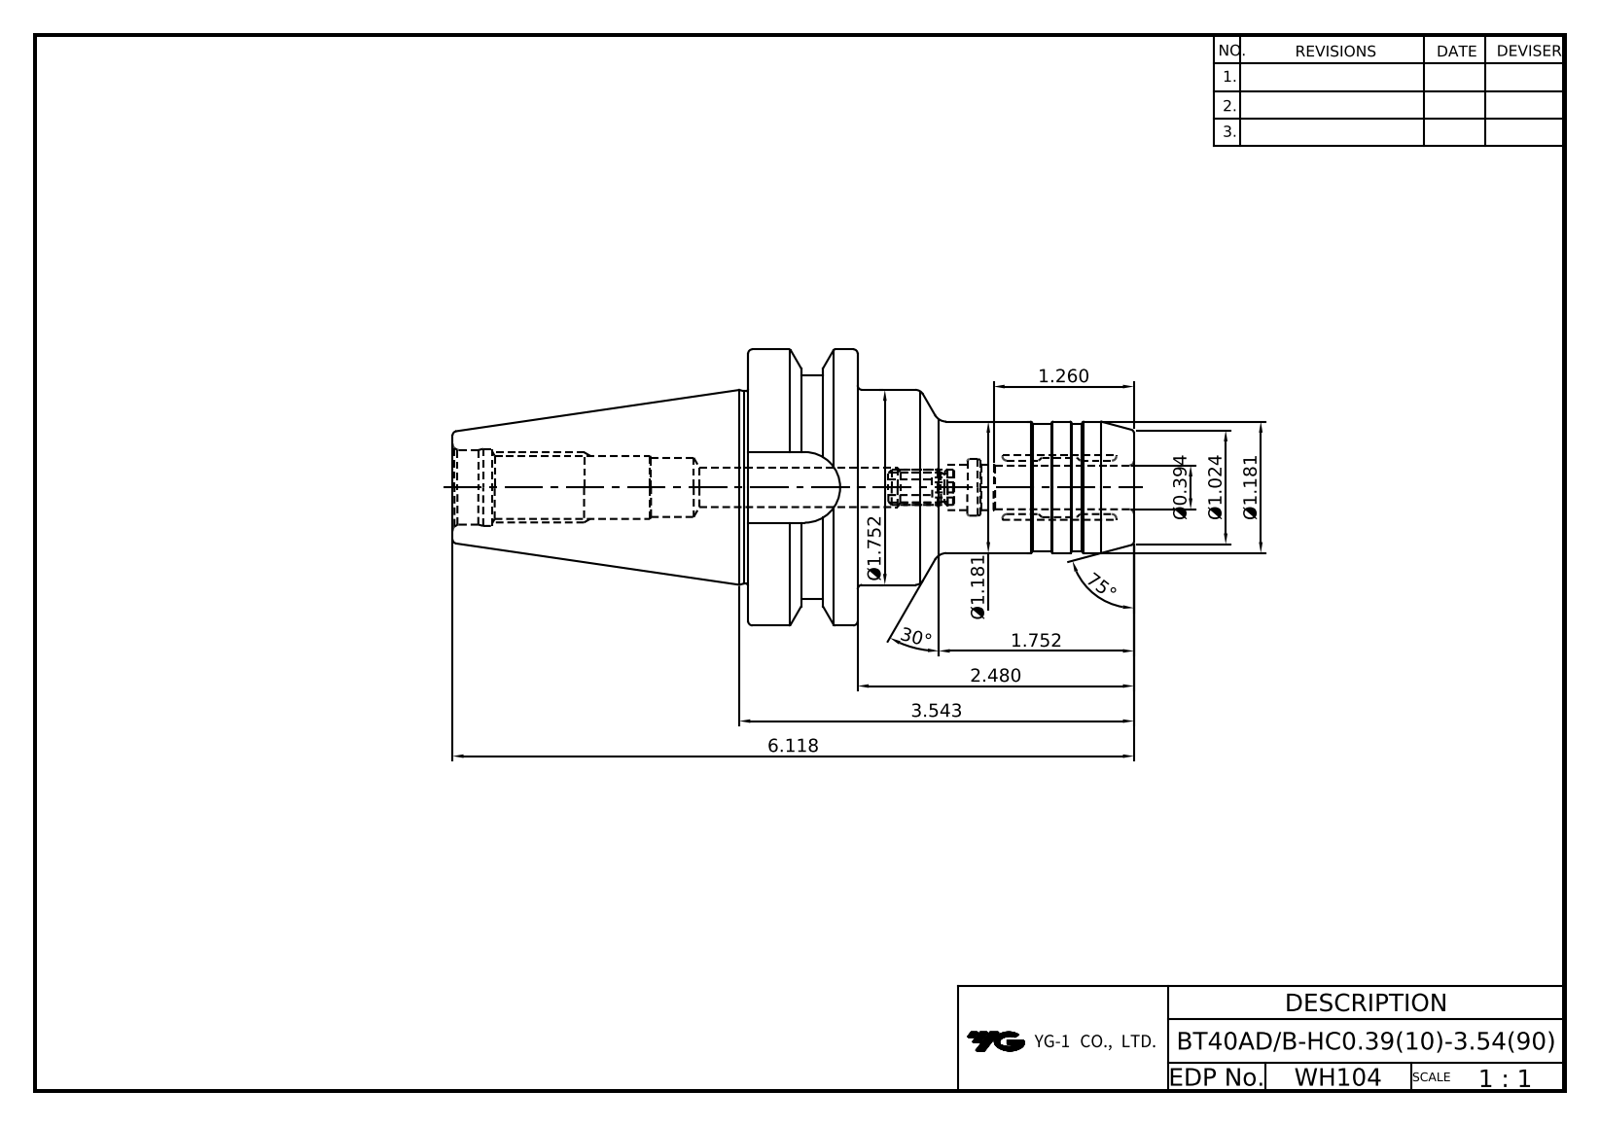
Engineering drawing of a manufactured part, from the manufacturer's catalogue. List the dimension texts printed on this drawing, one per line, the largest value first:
75°
30°
6.118
3.543
2.480
1.752
Ø1.752
1.260
Ø1.181
Ø1.181
Ø1.024
Ø0.394
